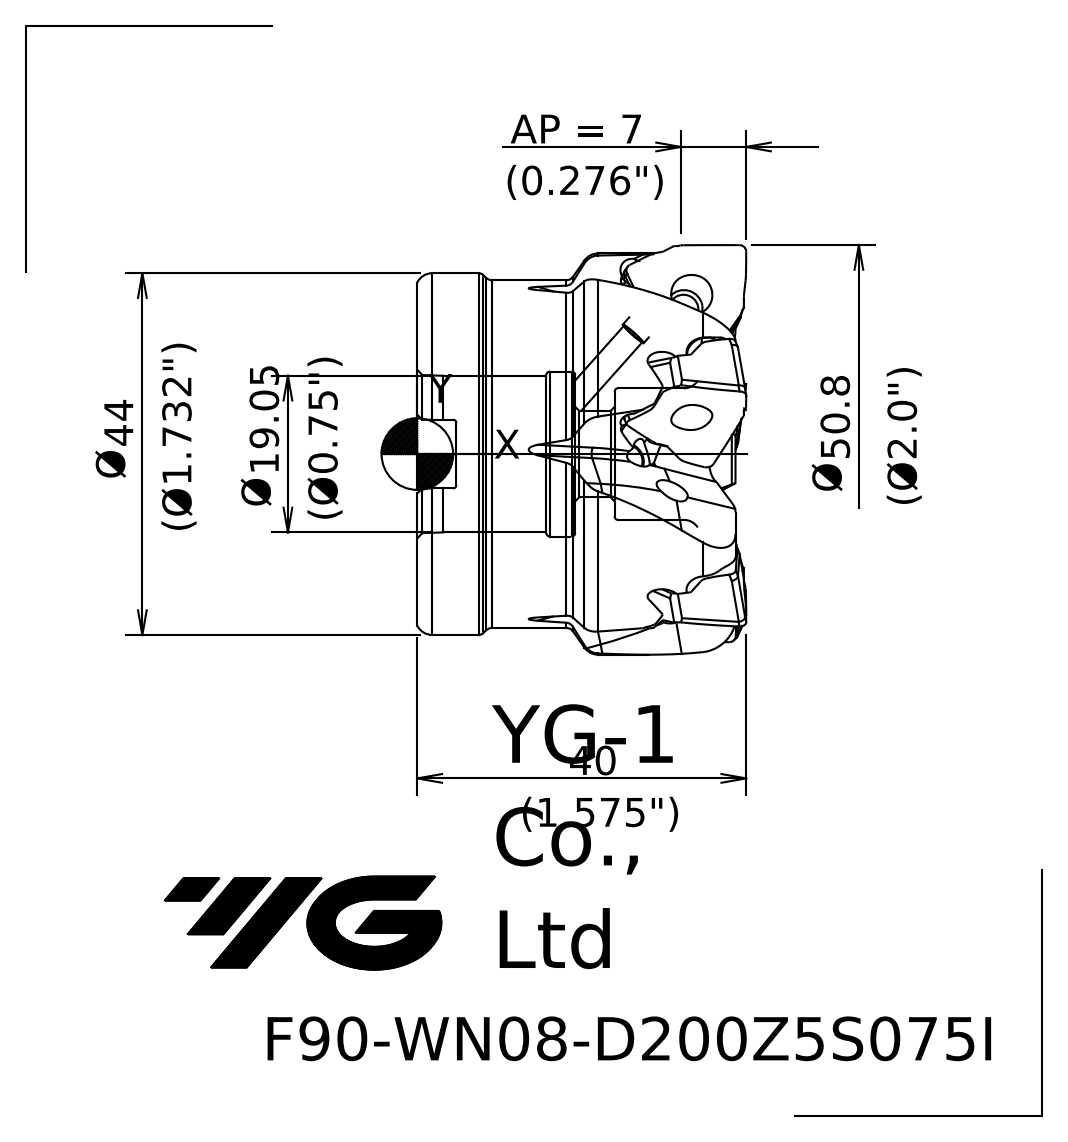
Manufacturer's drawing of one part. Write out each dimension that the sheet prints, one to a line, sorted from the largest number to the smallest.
50.8 Ø
40
19.05 Ø
AP = 7
